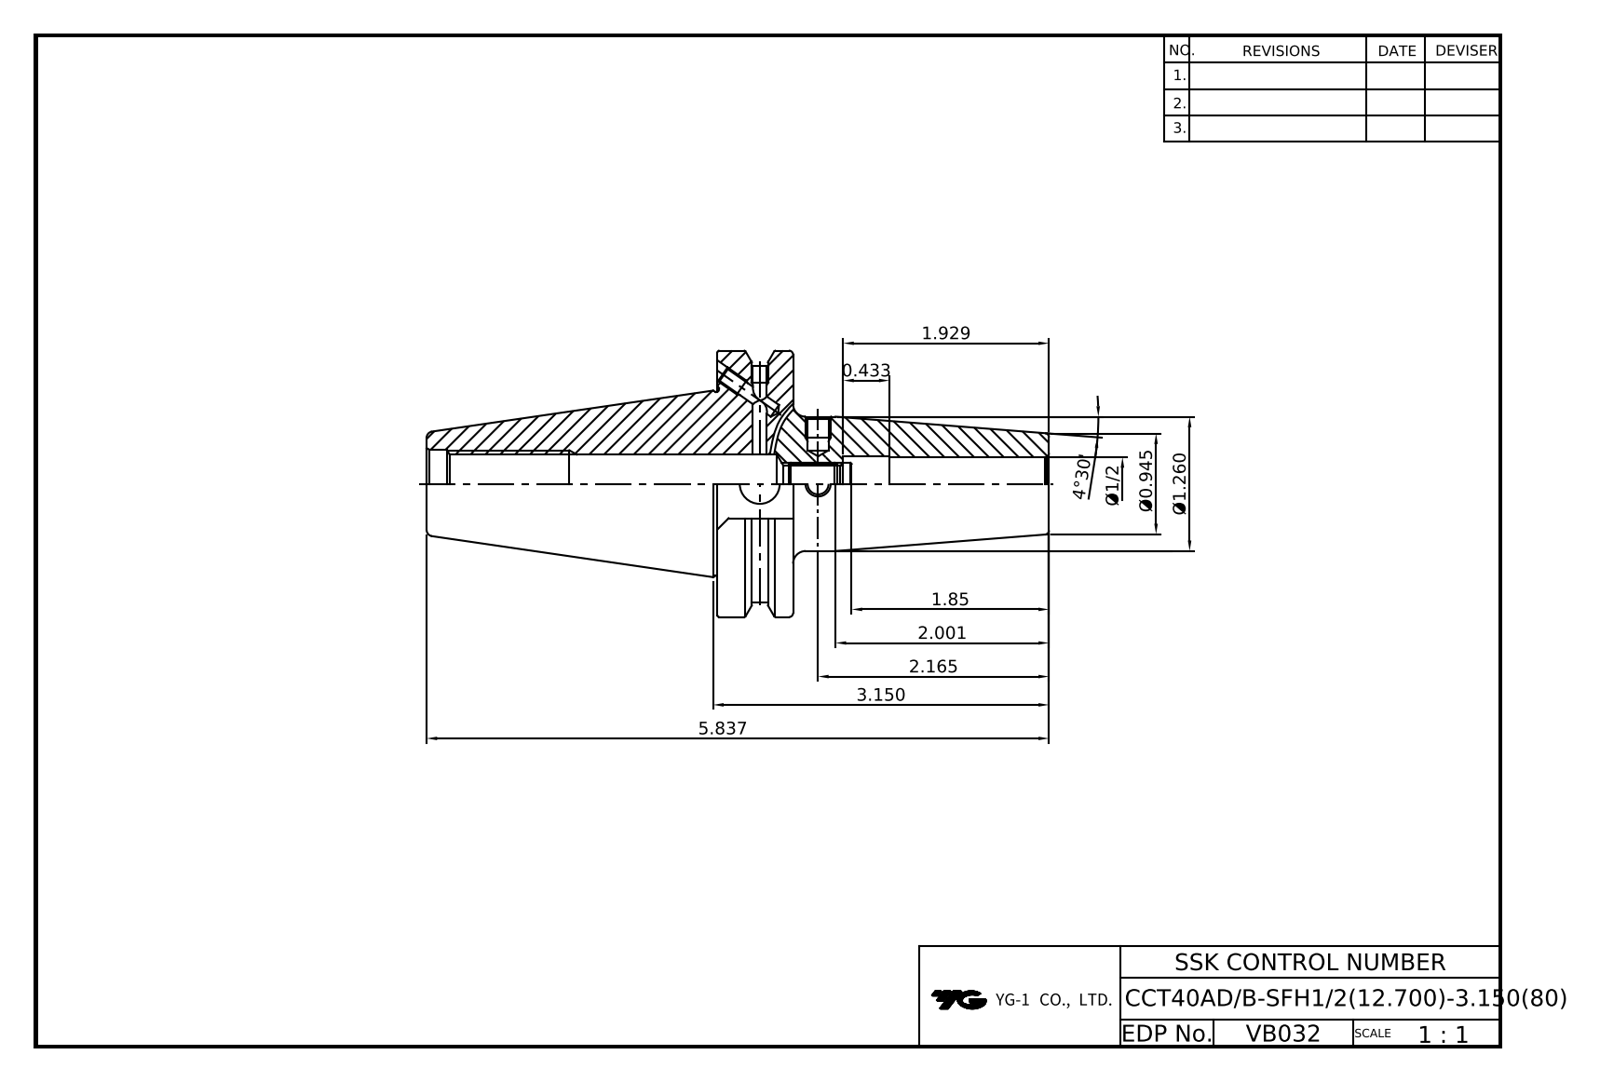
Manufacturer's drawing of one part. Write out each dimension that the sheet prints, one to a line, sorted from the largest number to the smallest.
5.837
4°30'
3.150
2.165
2.001
1.929
1.85
Ø1.260
Ø0.945
0.433
